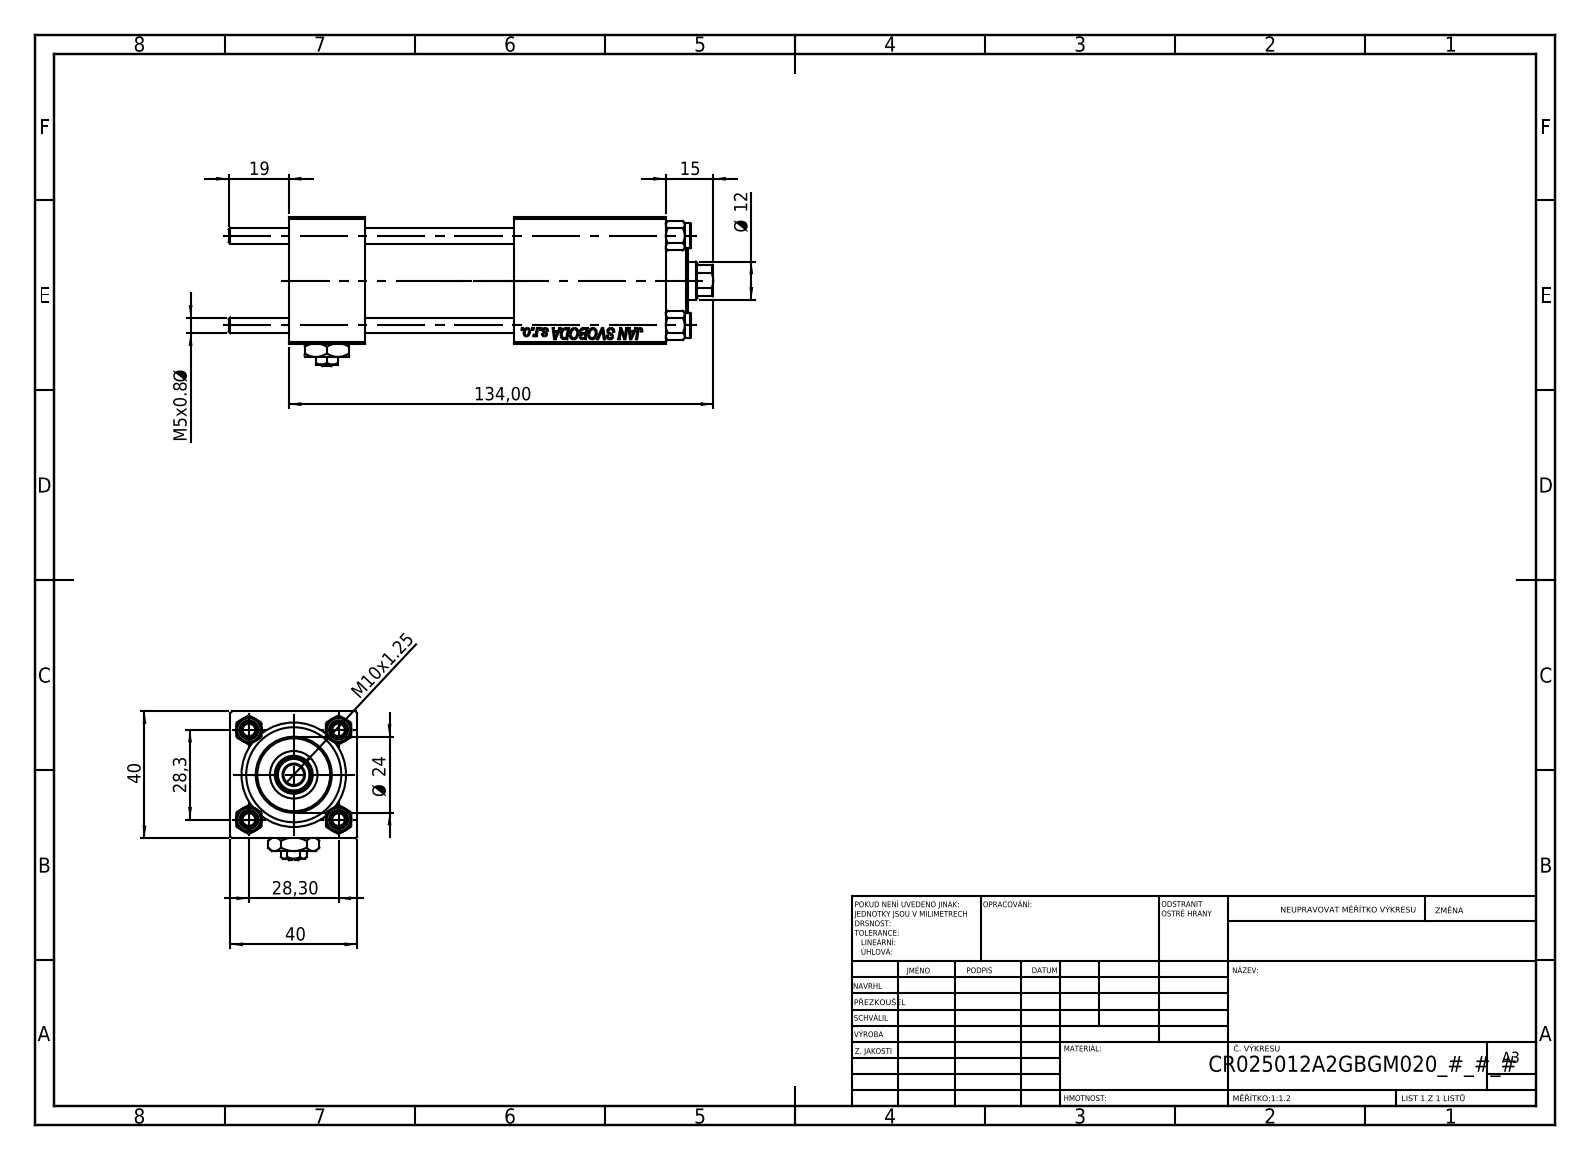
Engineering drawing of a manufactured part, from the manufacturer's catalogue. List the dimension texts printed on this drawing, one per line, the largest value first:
134,00
40
40
28,3
28,30
Ø 24
19
15
Ø 12
M10x1.25
M5x0.8 Ø
